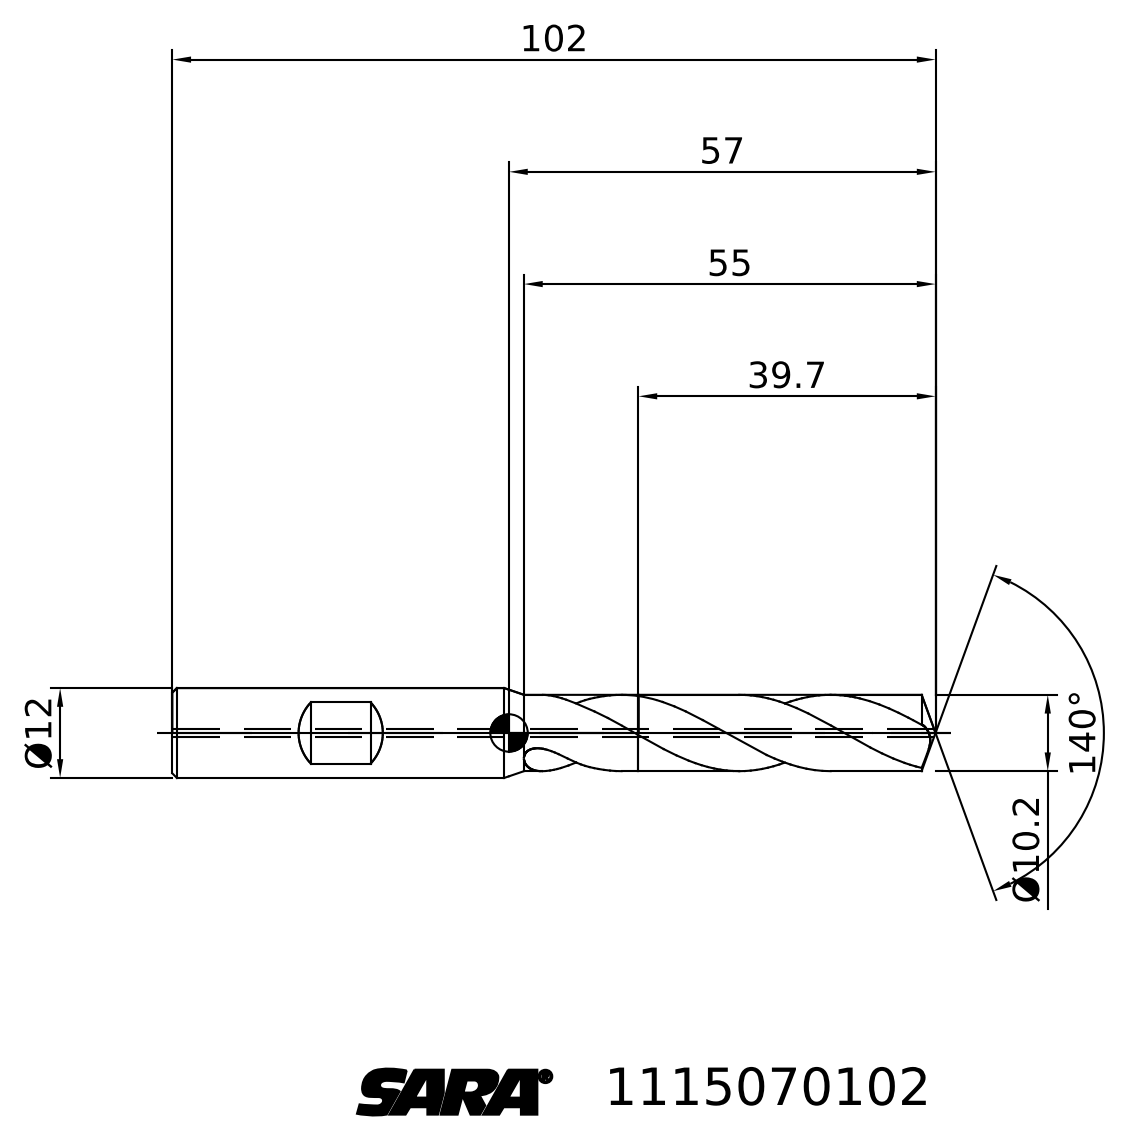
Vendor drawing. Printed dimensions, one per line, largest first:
140°
102
57
55
39.7
Ø12
Ø10.2
